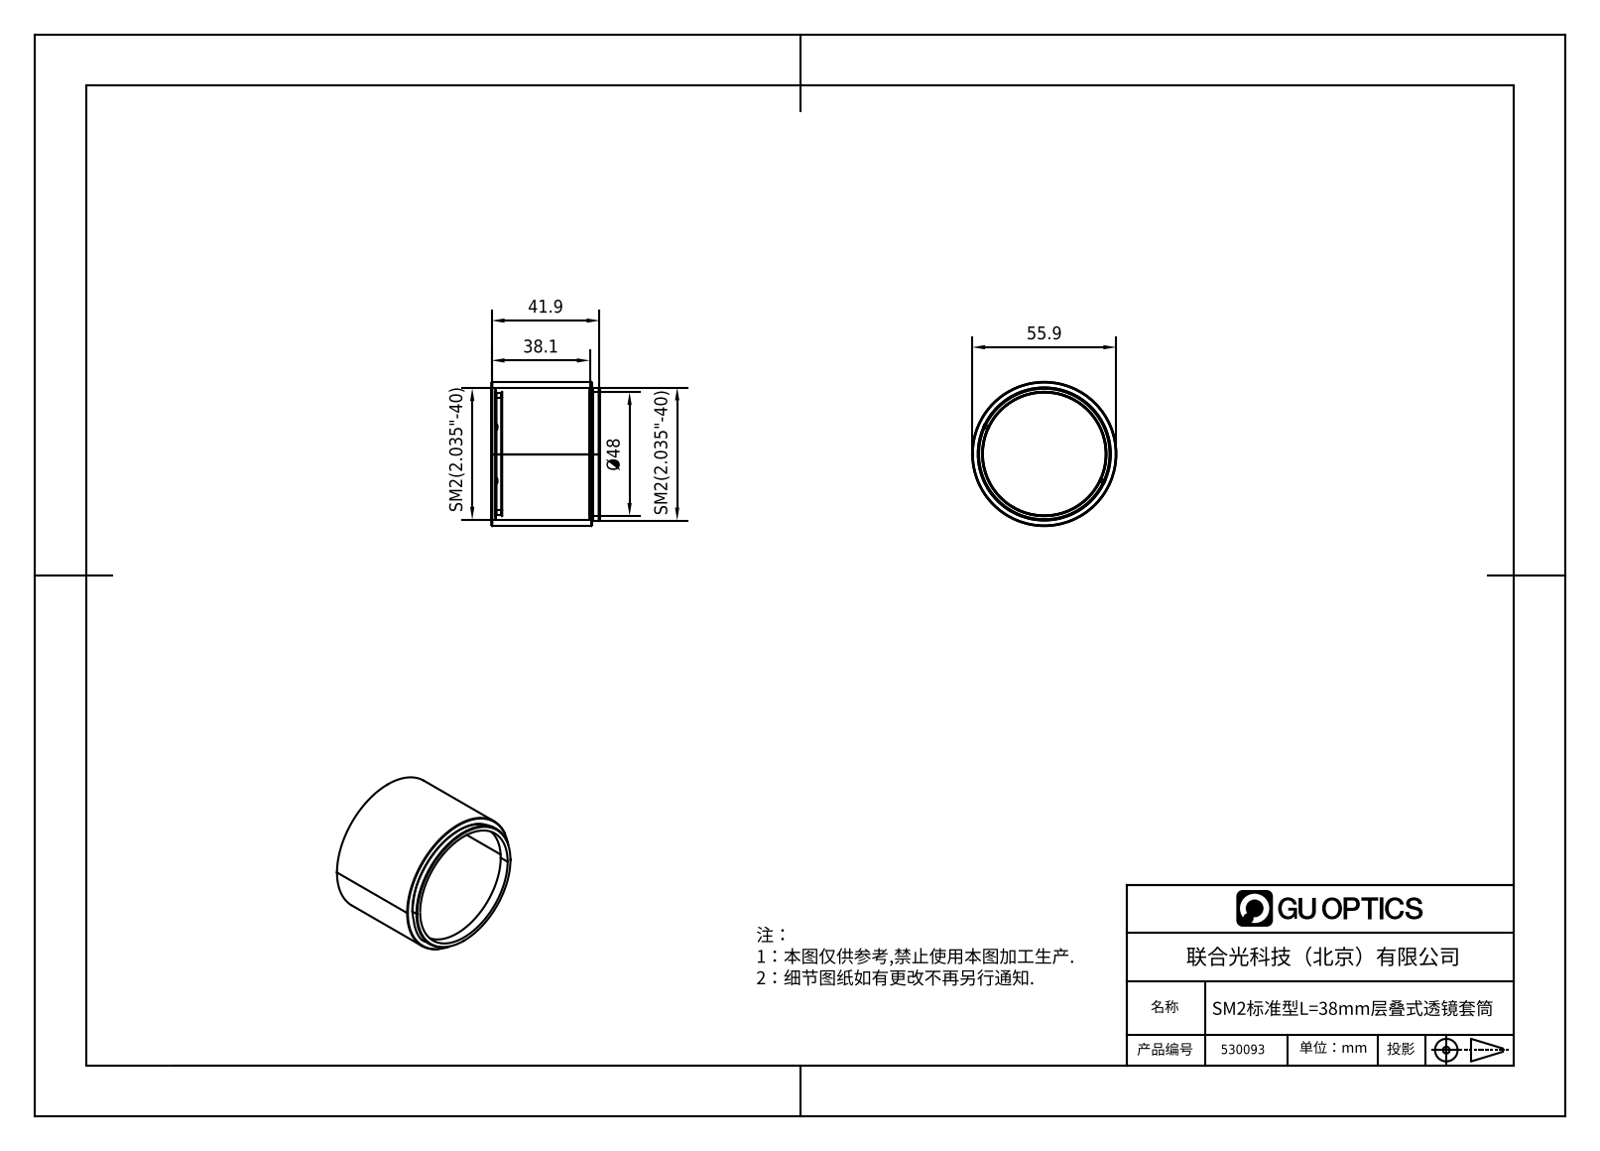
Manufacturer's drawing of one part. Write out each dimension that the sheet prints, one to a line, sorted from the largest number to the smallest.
55.9
Ø48
41.9
38.1
SM2(2.035"-40)
SM2(2.035"-40)
